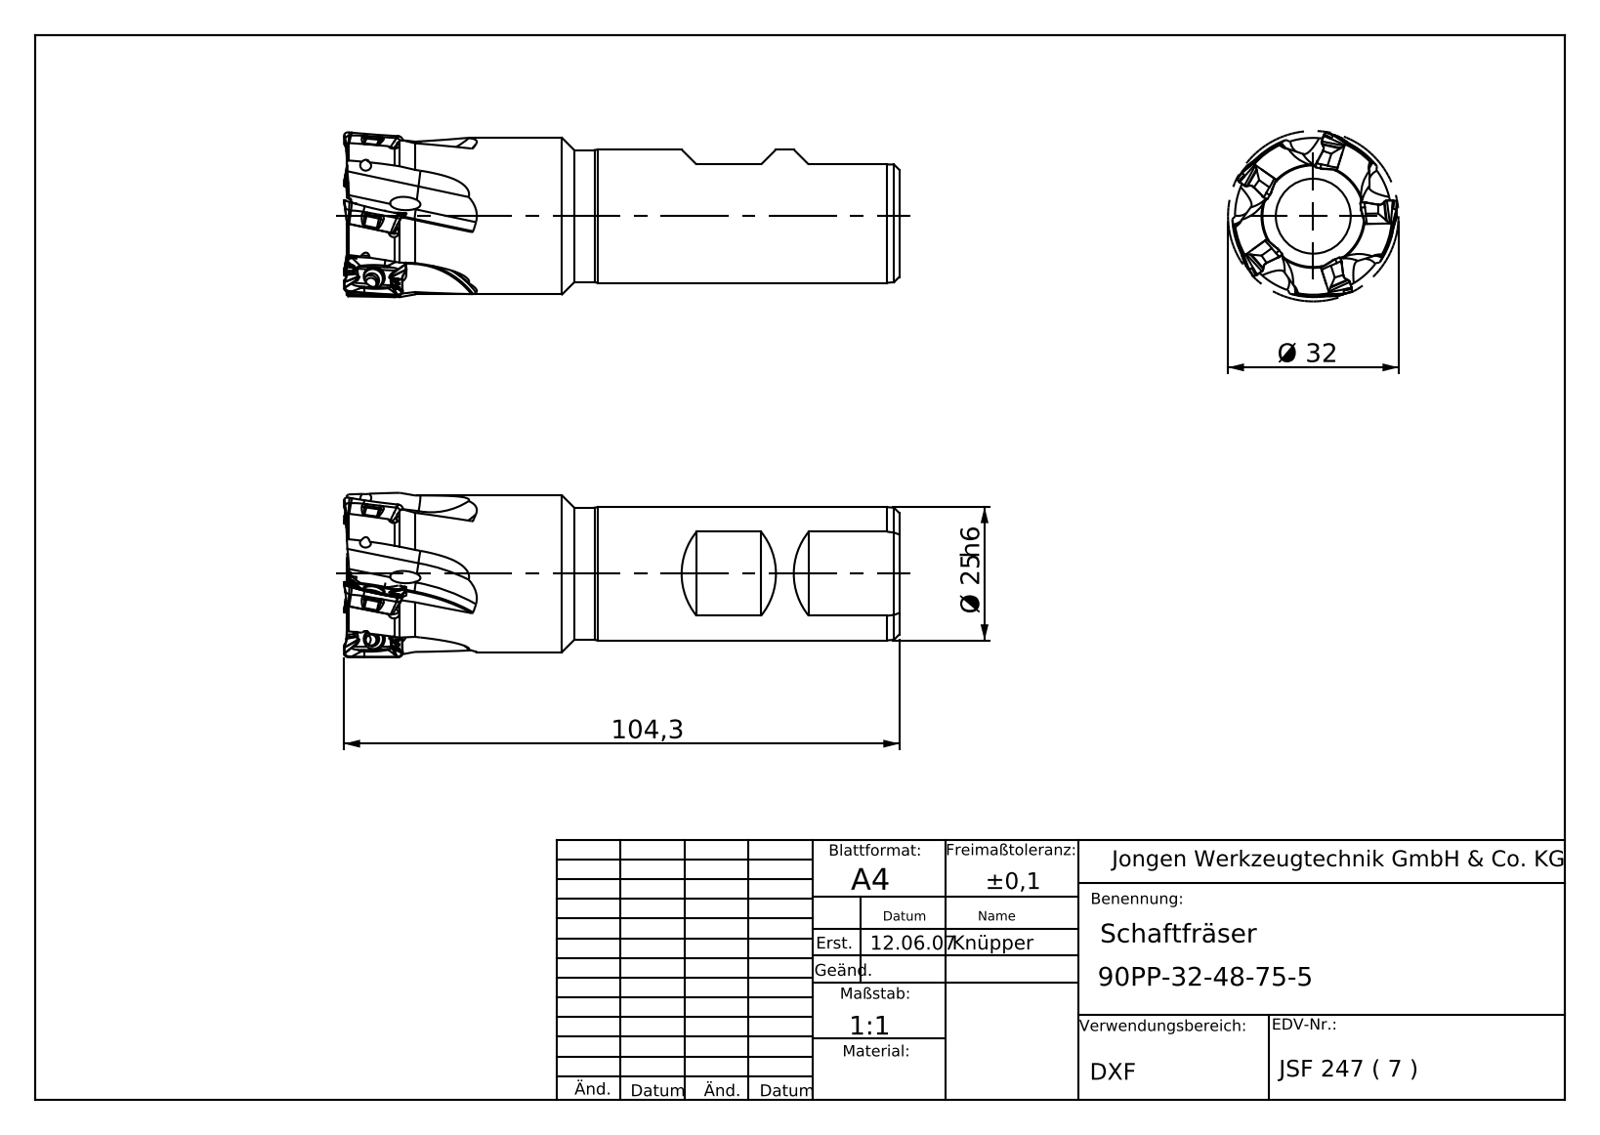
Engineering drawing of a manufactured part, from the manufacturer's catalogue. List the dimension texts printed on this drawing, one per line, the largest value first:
104,3
Ø 32
Ø 25 h6
